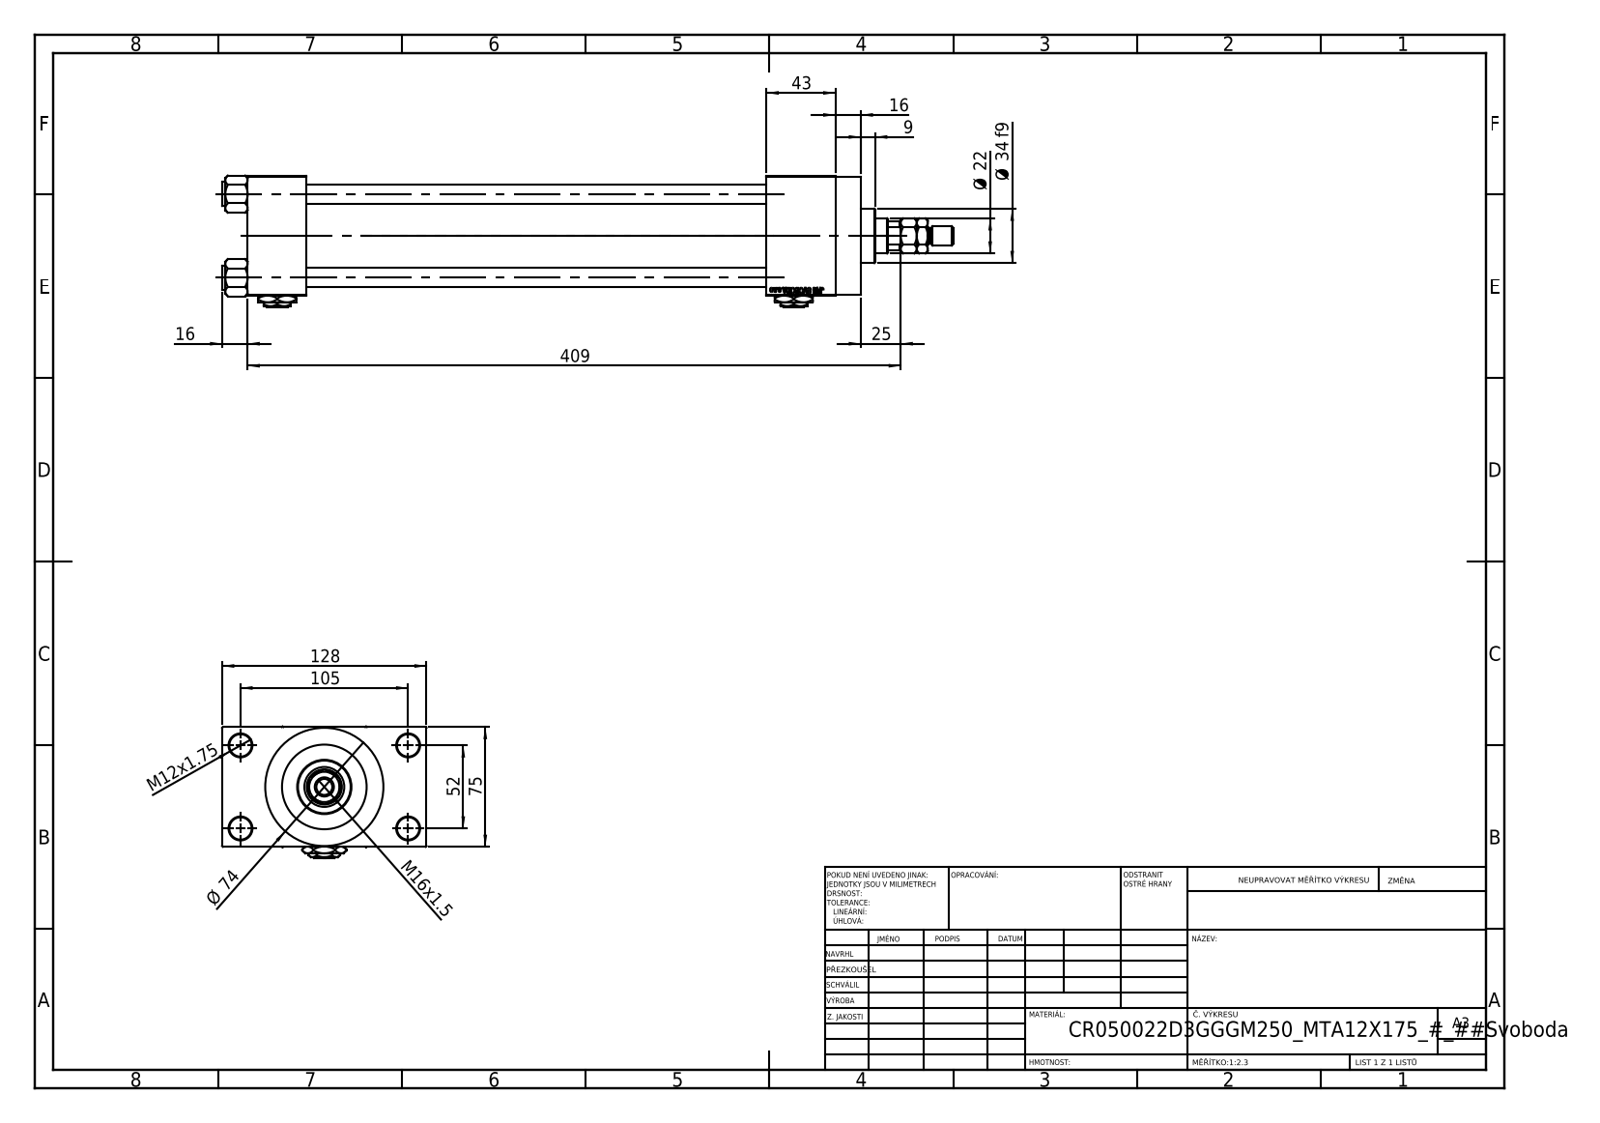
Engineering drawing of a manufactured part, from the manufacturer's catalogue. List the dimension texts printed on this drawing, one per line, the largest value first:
409
128
105
75
Ø 74
52
43
Ø 34 f9
25
Ø 22
16
16
M16x1.5
M12x1.75
9
